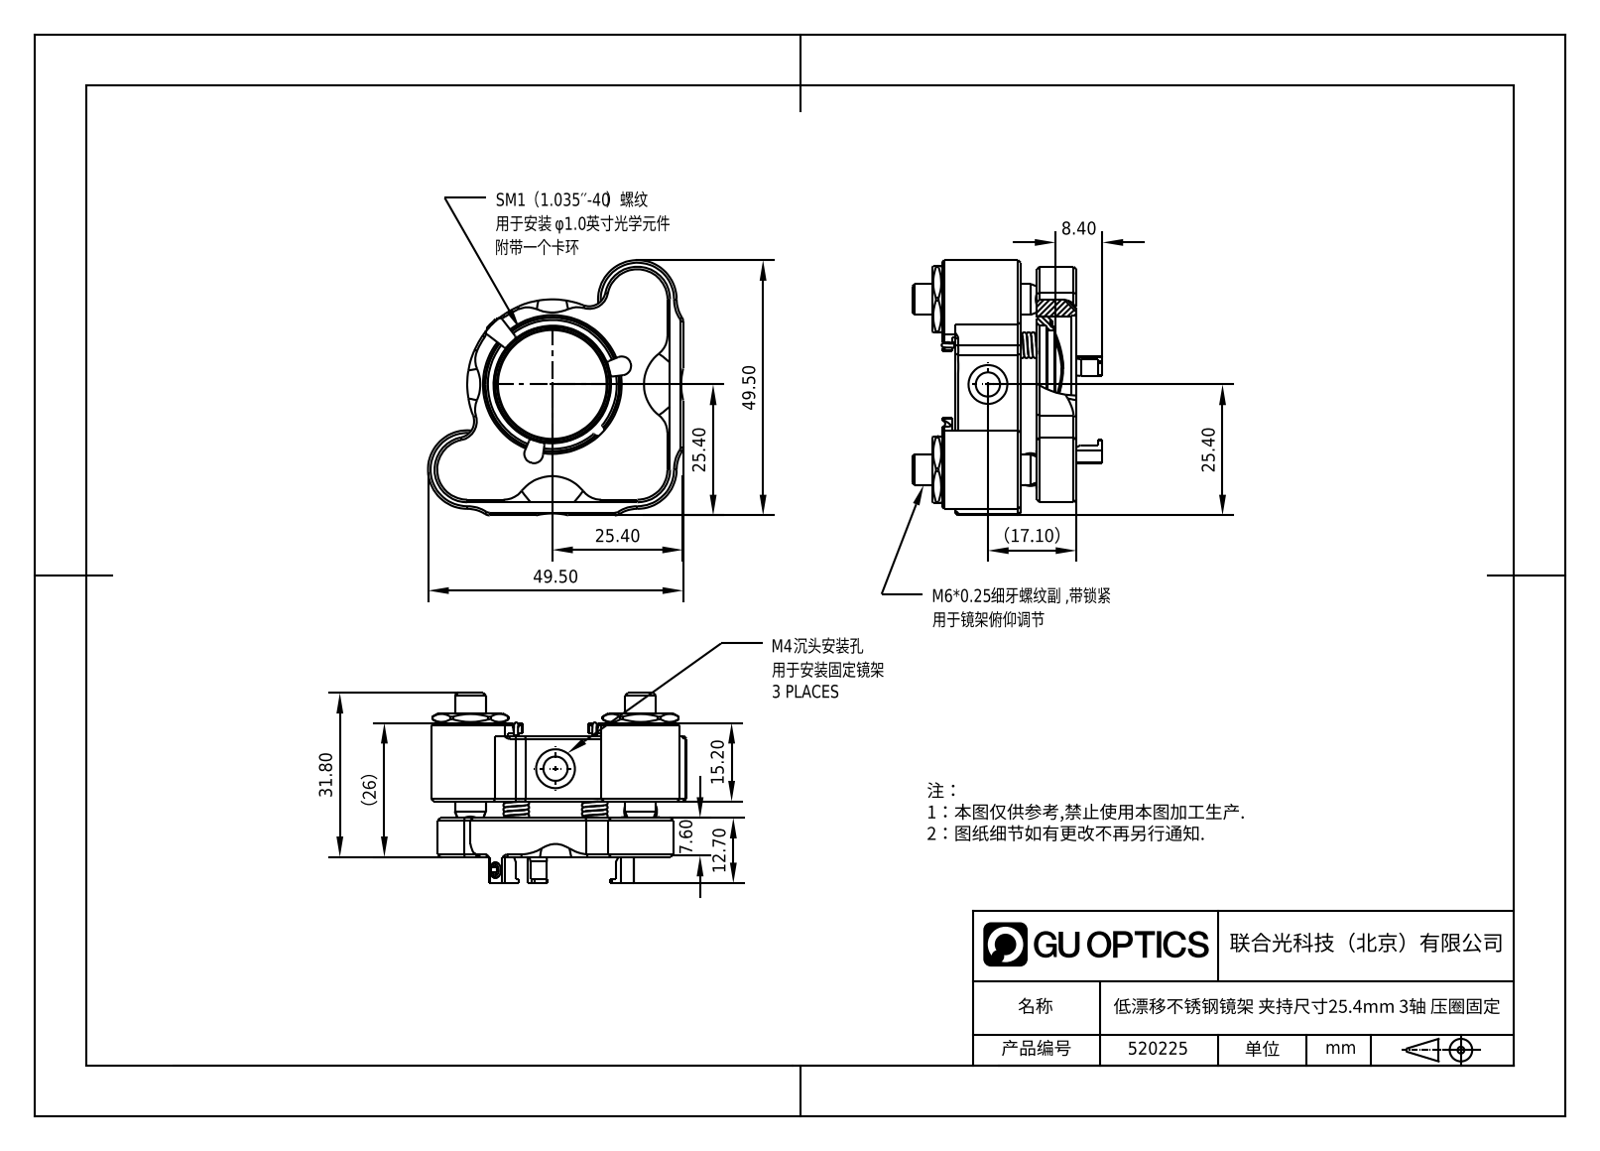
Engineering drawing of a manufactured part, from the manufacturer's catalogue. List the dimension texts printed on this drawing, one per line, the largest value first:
49.50
49.50
31.80
（26）
25.40
25.40
25.40
（17.10）
15.20
12.70
8.40
7.60
